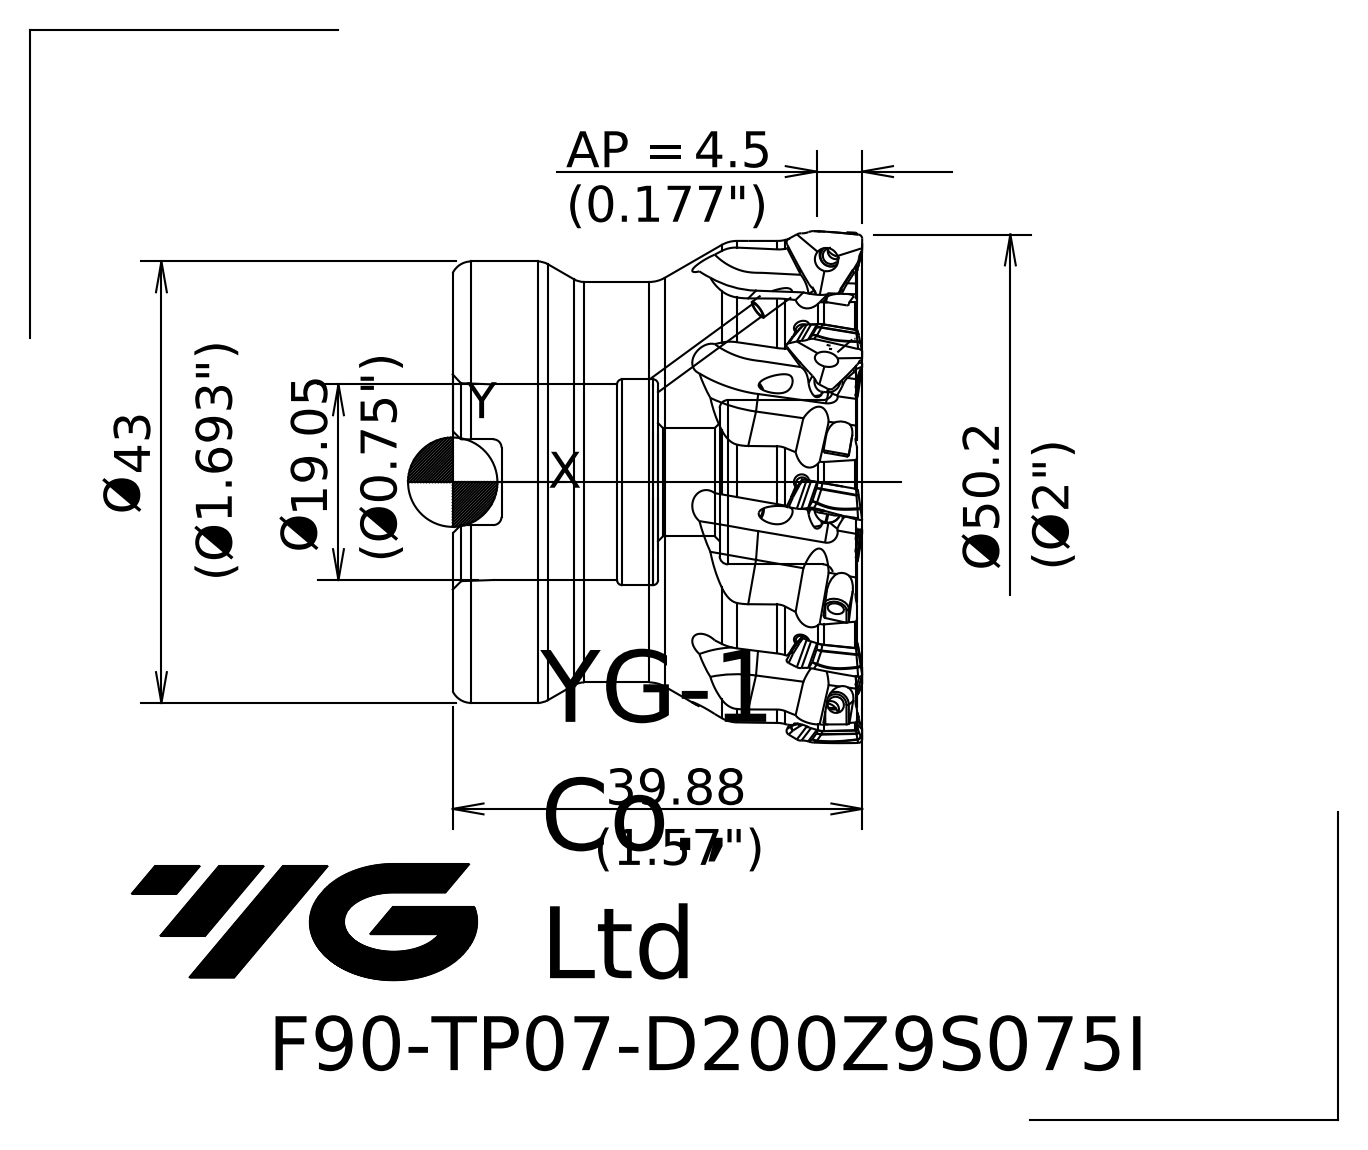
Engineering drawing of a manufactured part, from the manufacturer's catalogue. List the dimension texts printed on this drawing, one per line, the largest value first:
Ø50.2
39.88
Ø 19.05
4.5 AP =
